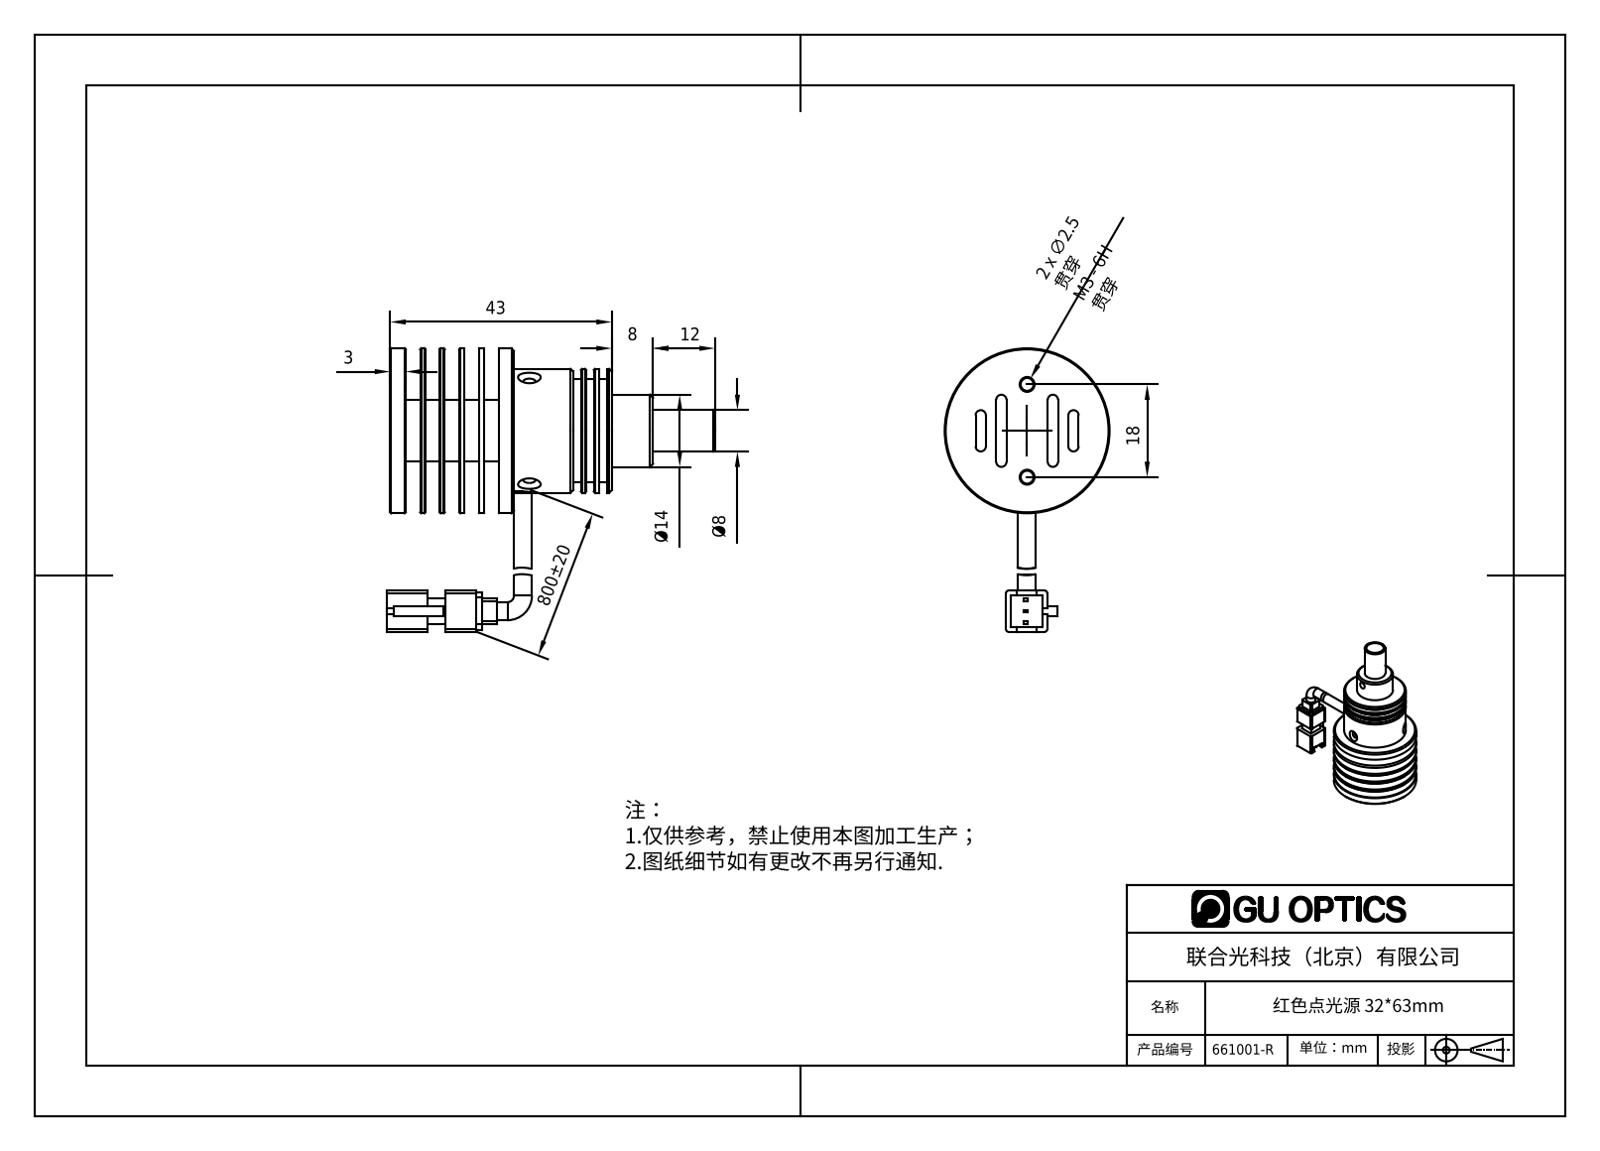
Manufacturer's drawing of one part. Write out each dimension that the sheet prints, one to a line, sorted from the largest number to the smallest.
800±20
43
18
Ø14
12
Ø8
8
3
2 x ∅2.5 贯穿 M3 - 6H 贯穿
